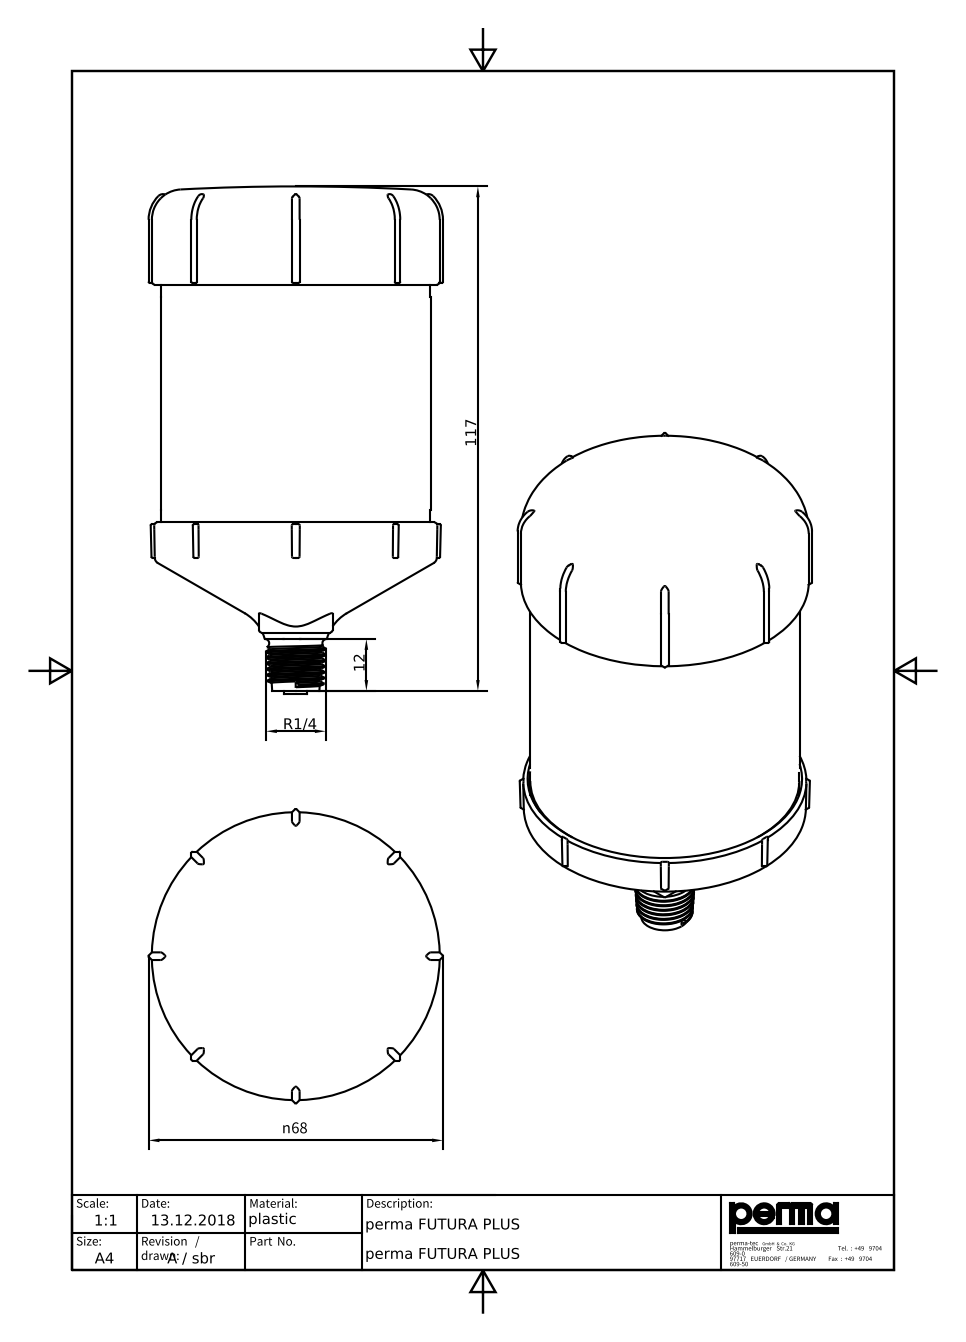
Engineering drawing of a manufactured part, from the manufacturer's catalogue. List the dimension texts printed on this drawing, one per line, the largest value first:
117
n68
12
R1/4
